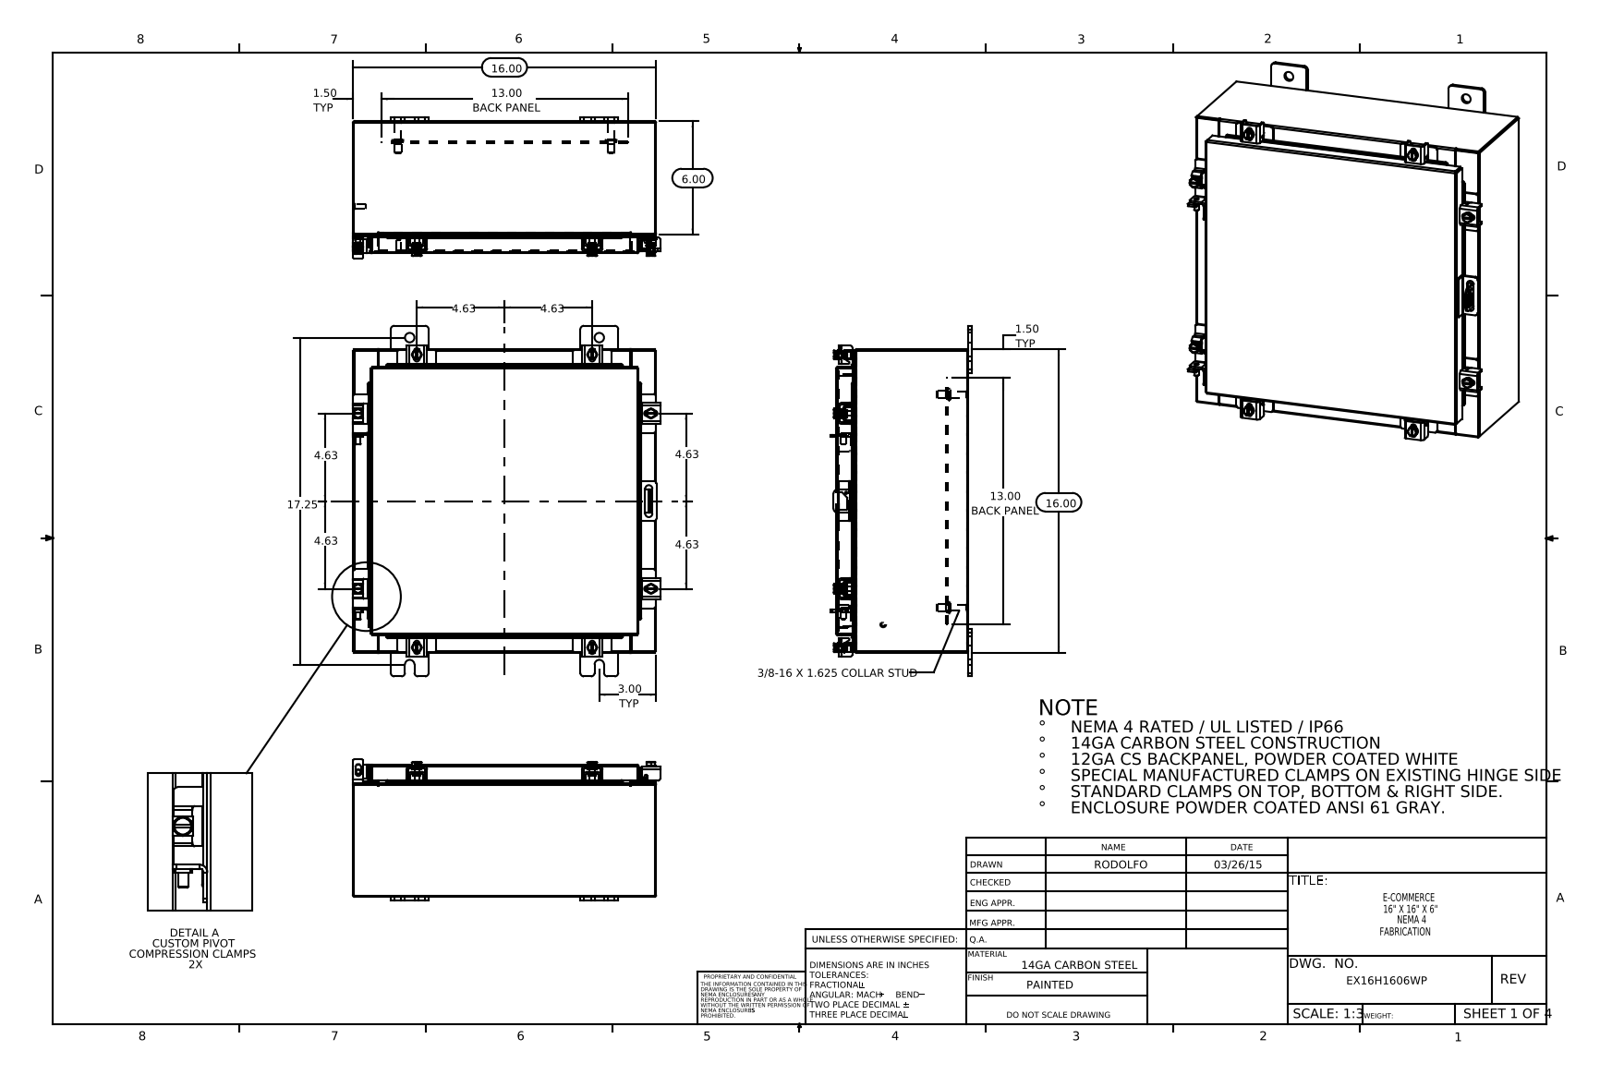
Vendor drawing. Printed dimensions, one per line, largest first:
17.25
16.00
16.00
13.00 BACK PANEL
13.00 BACK PANEL
6.00
4.63
4.63
4.63
4.63
4.63
4.63
3.00 TYP
1.50 TYP
1.50 TYP
